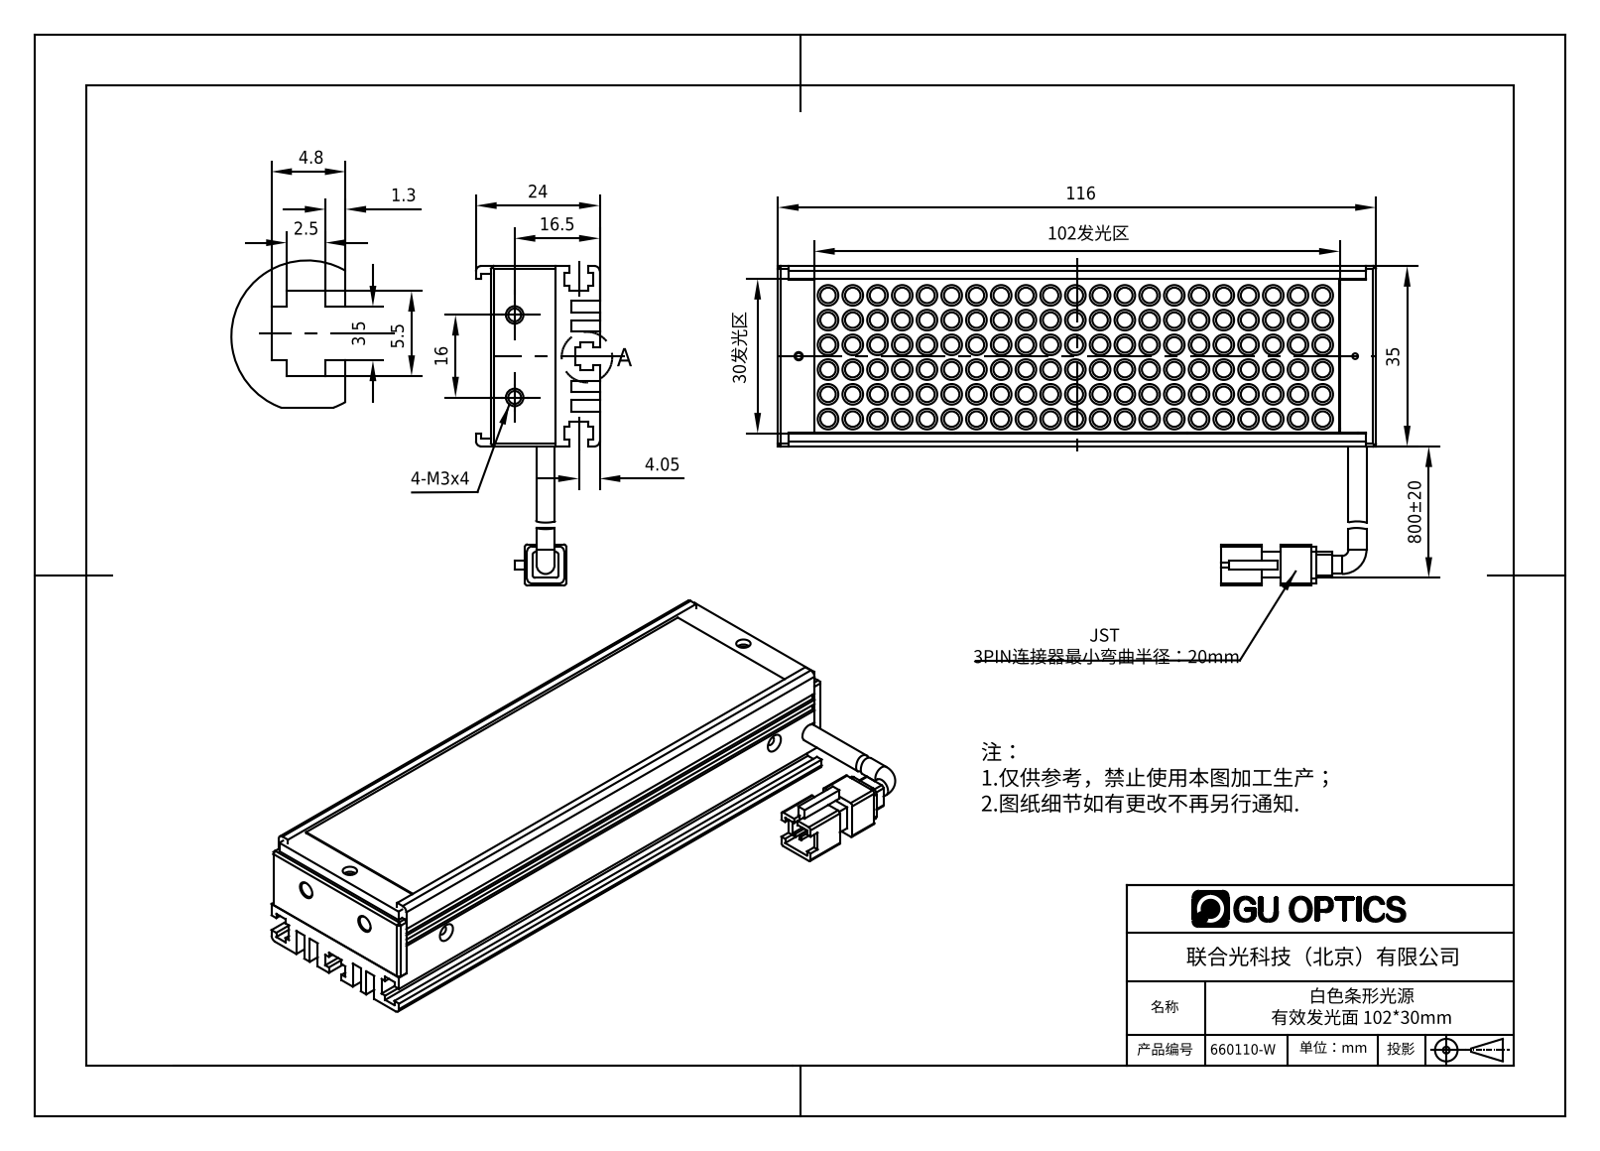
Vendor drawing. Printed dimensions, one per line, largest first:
800±20
116
102发光区
35
30发光区
24
16.5
16
5.5
4.8
4.05
3.5
2.5
1.3
